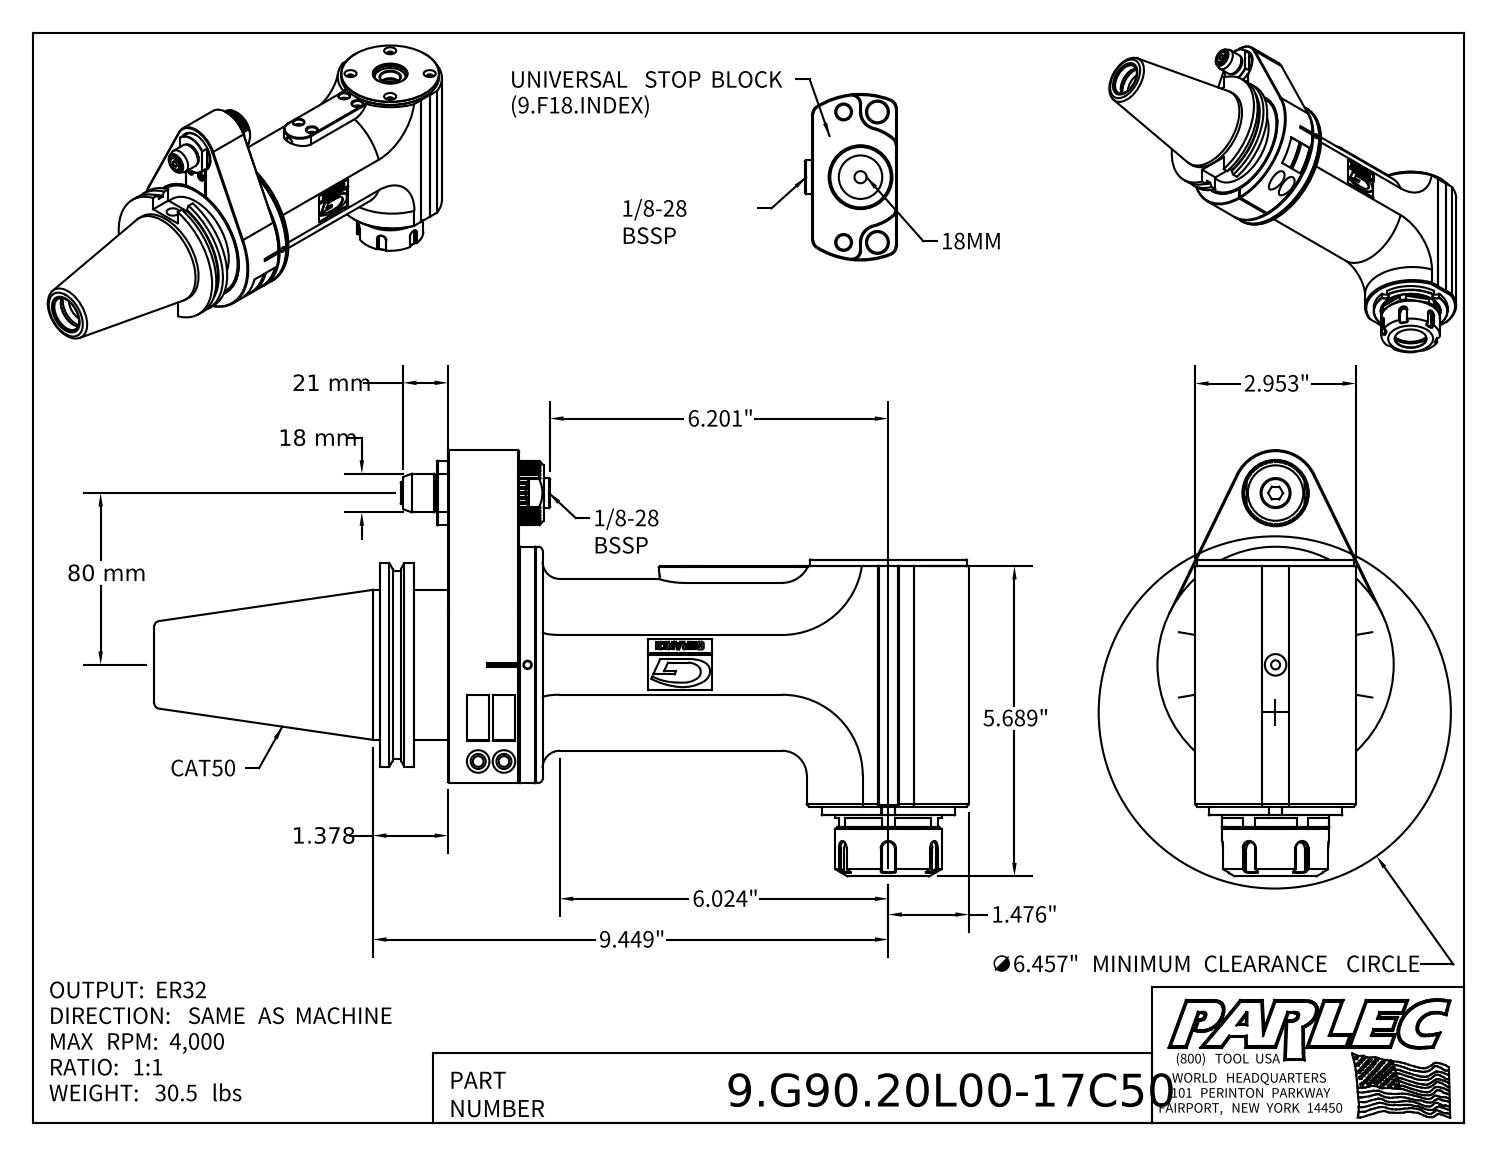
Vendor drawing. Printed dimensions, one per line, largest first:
80 mm
21 mm
18 mm
9.449"
∅6.457" MINIMUM CLEARANCE CIRCLE
6.201"
6.024"
5.689"
2.953"
1.476"
1.378
